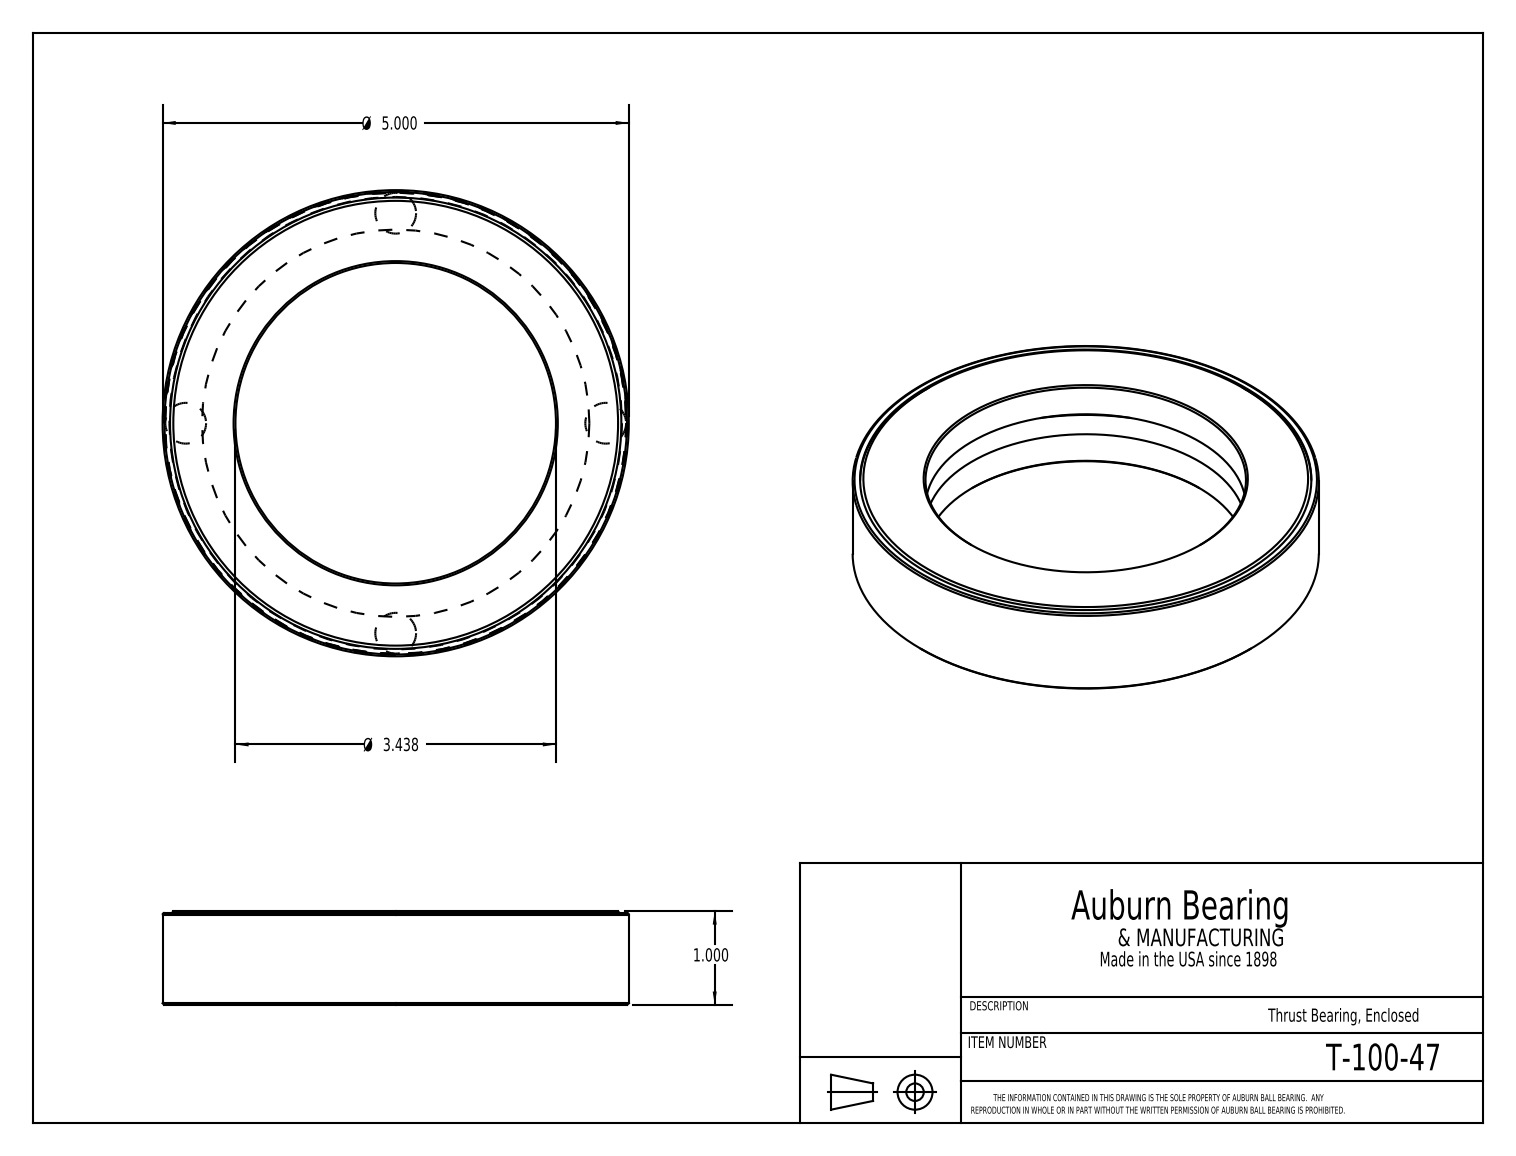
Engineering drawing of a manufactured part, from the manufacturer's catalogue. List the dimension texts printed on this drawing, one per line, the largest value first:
Ø 5.000
Ø 3.438
1.000
